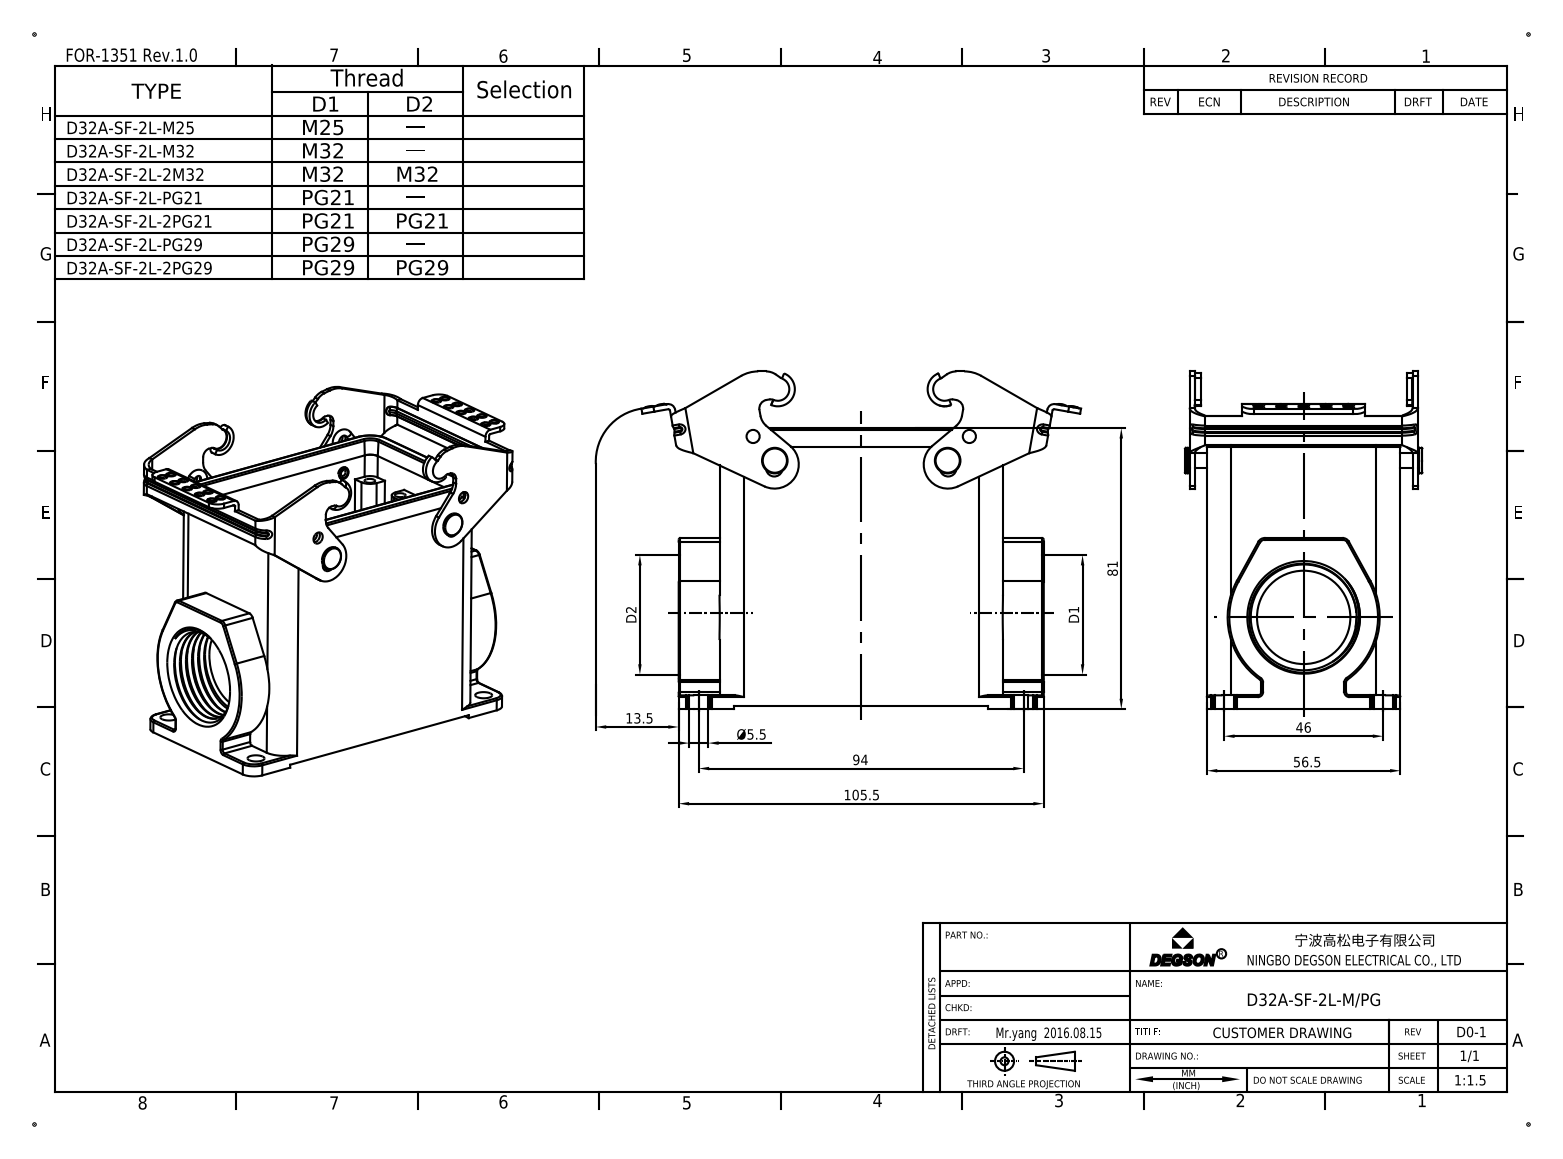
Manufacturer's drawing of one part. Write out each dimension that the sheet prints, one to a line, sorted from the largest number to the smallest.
105.5
94
81
56.5
46
13.5
Ø5.5
D2
D1
